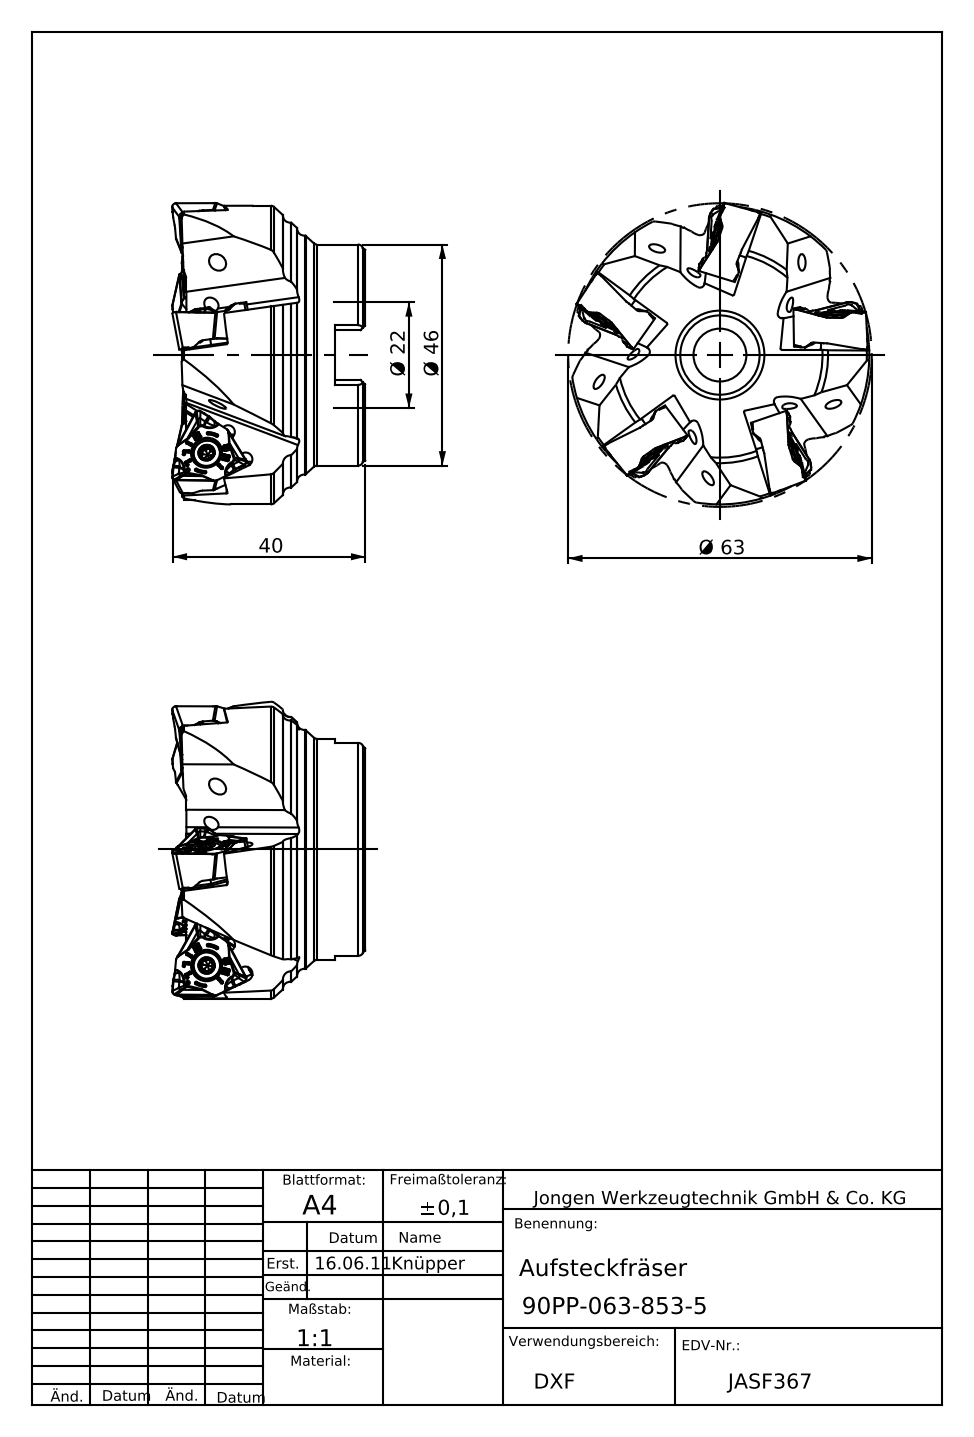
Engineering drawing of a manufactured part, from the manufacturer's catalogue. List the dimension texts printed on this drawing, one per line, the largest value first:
Ø 63
Ø 46
40
Ø 22
